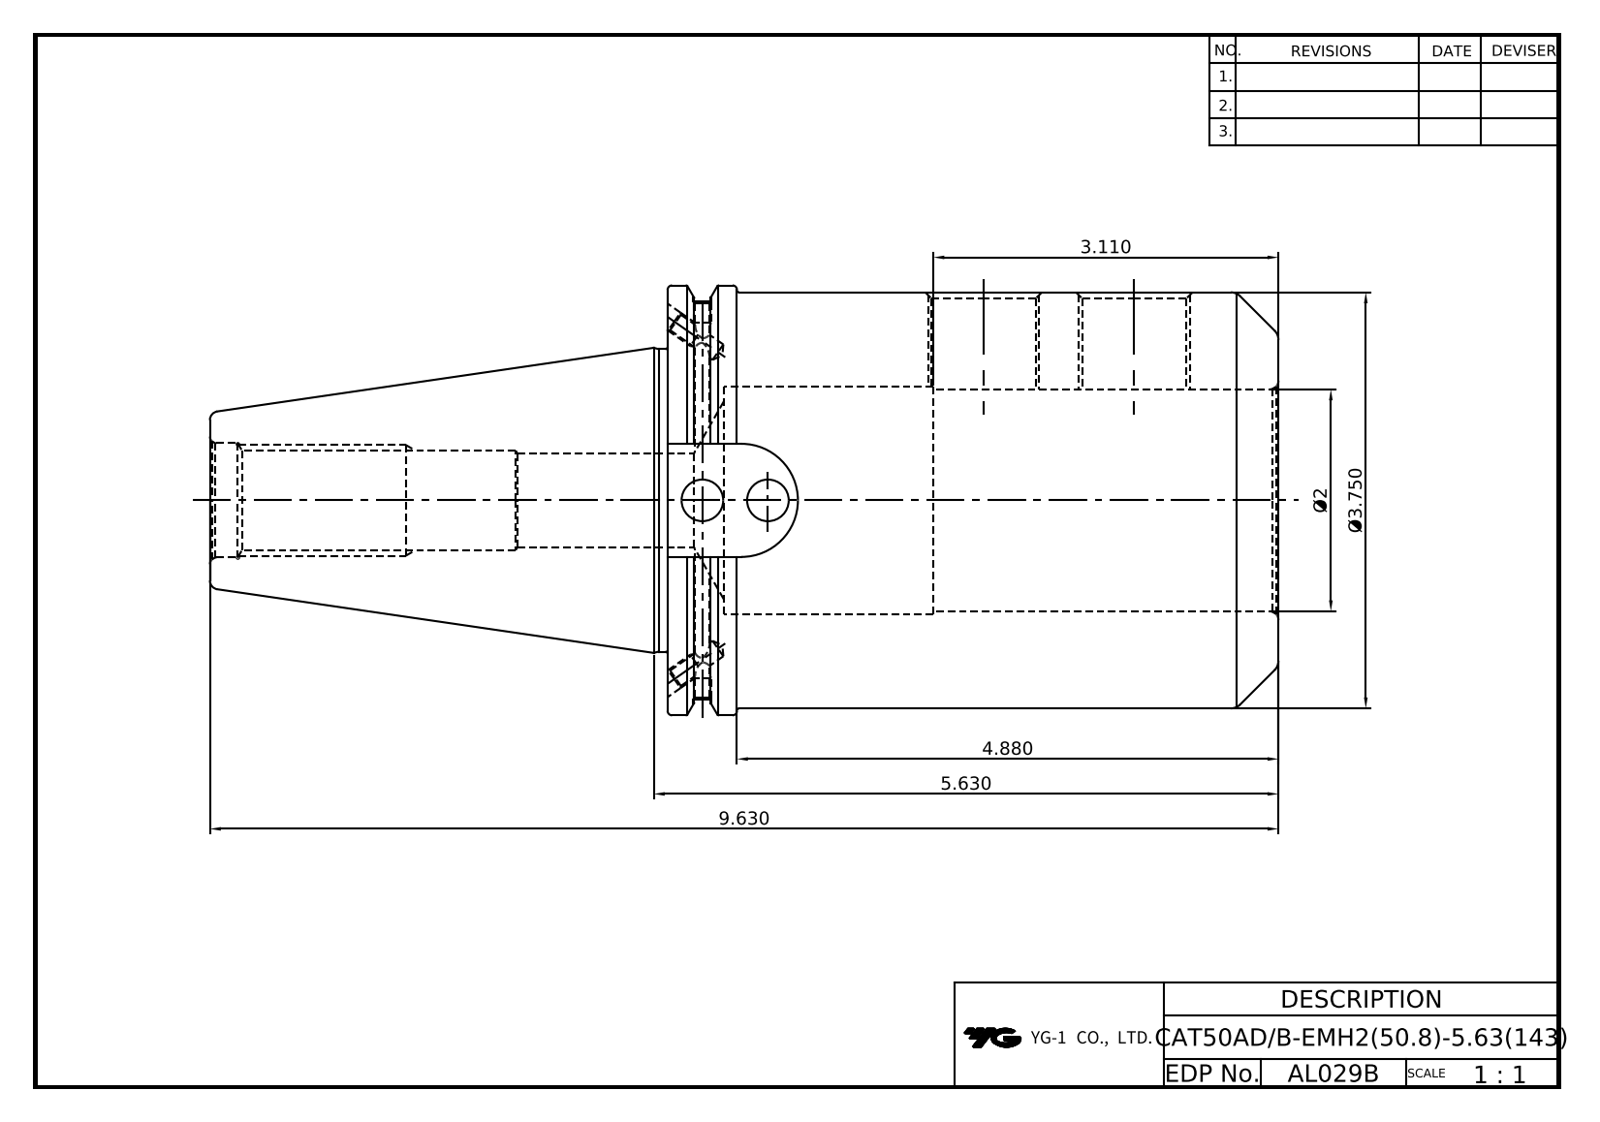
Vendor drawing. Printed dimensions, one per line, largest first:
9.630
5.630
4.880
Ø3.750
3.110
Ø2
